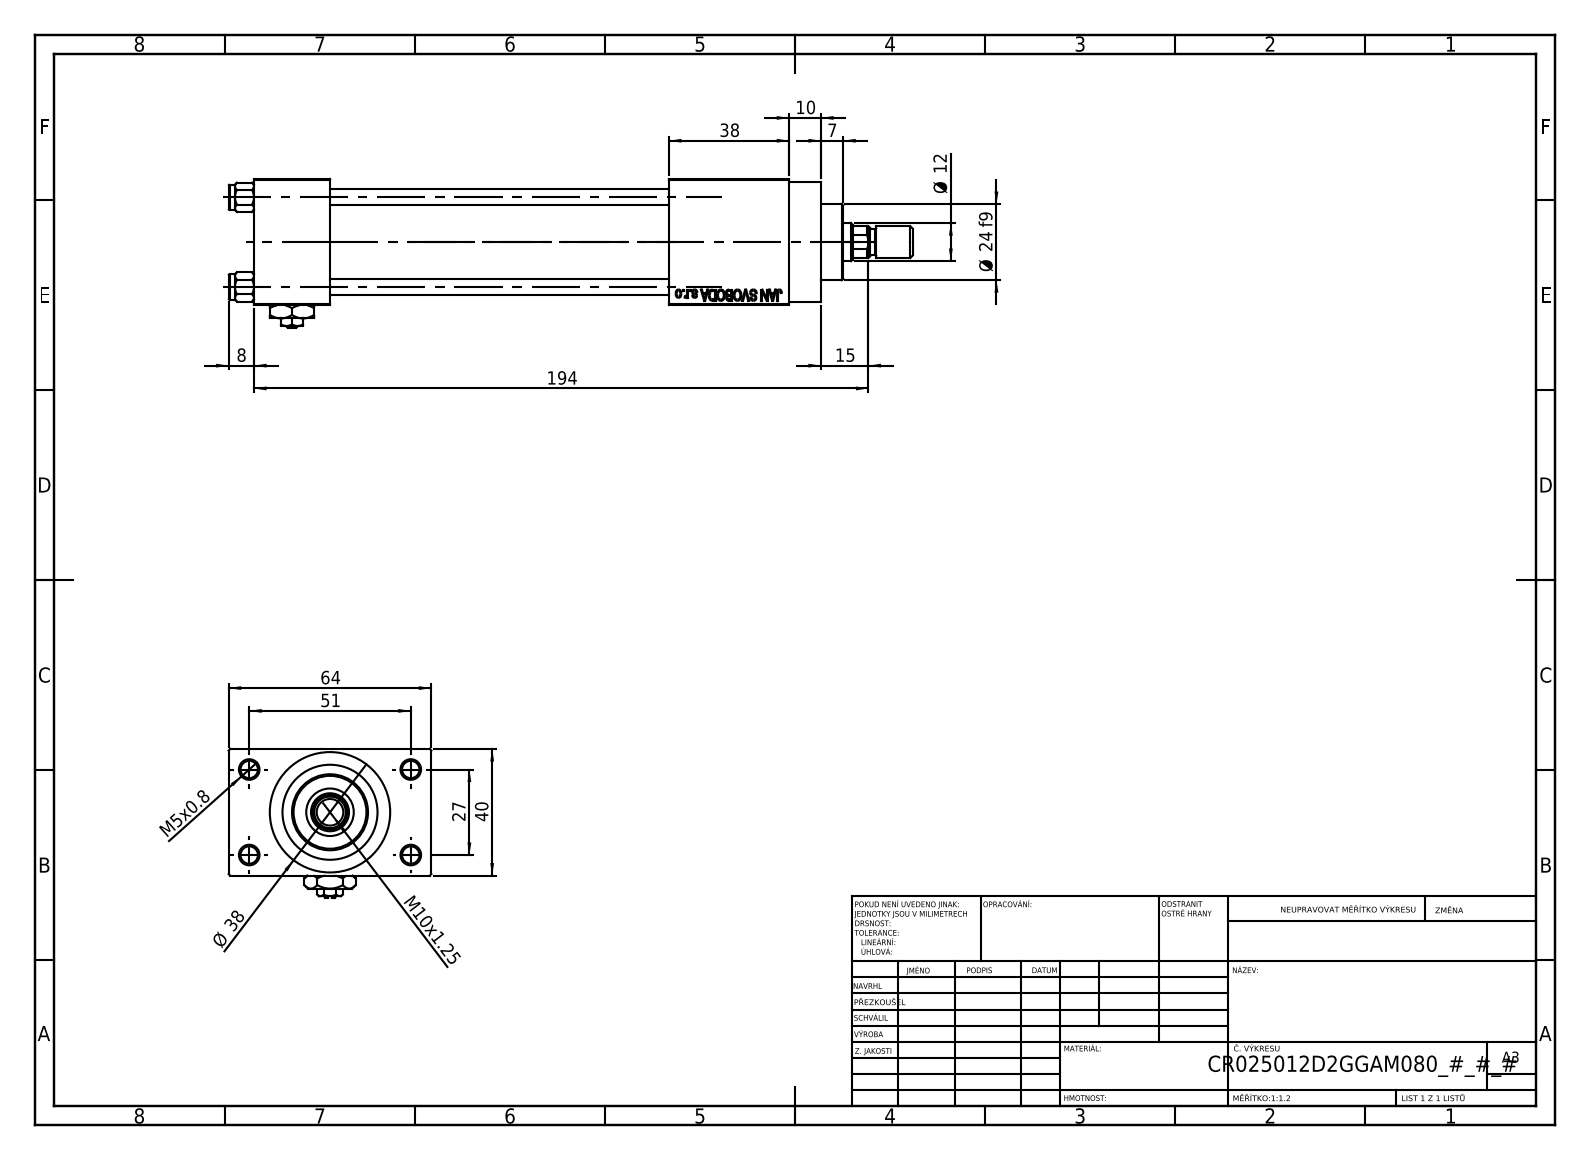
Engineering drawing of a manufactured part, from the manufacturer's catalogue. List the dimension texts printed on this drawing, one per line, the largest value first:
194
64
51
40
38
Ø 38
27
Ø 24 f9
15
Ø 12
10
M10x1.25
8
7
M5x0.8
